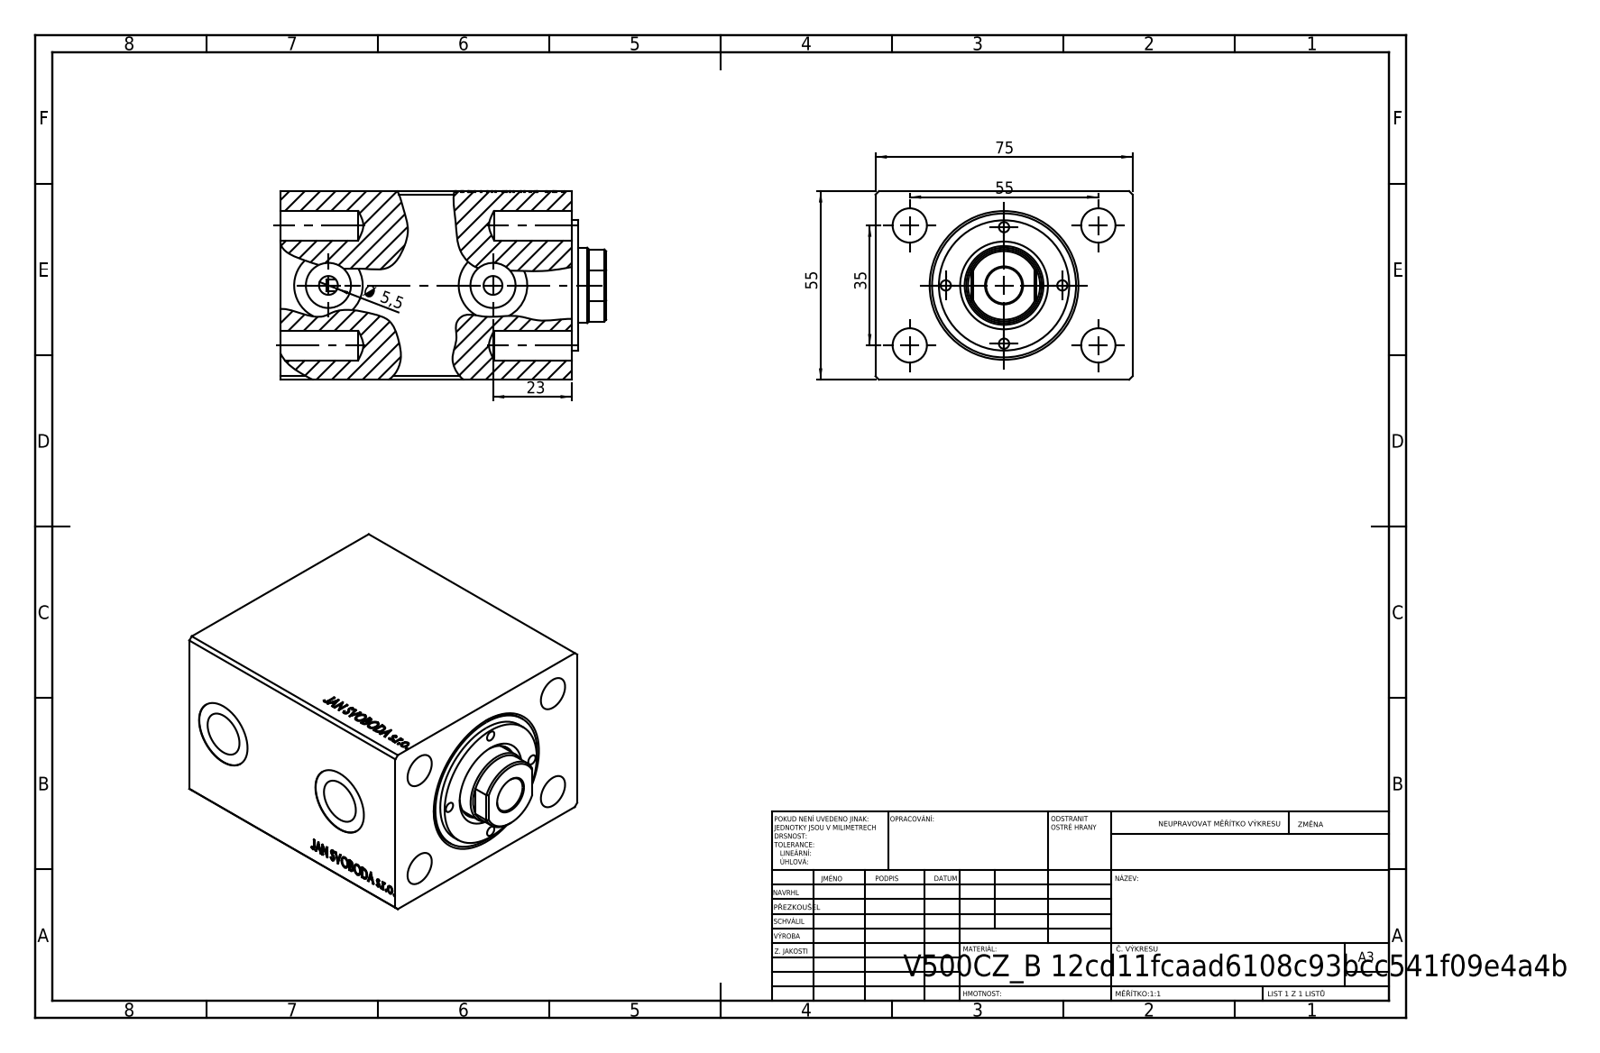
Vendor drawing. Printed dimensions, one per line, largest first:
75
55
55
35
23
Ø 5,5
